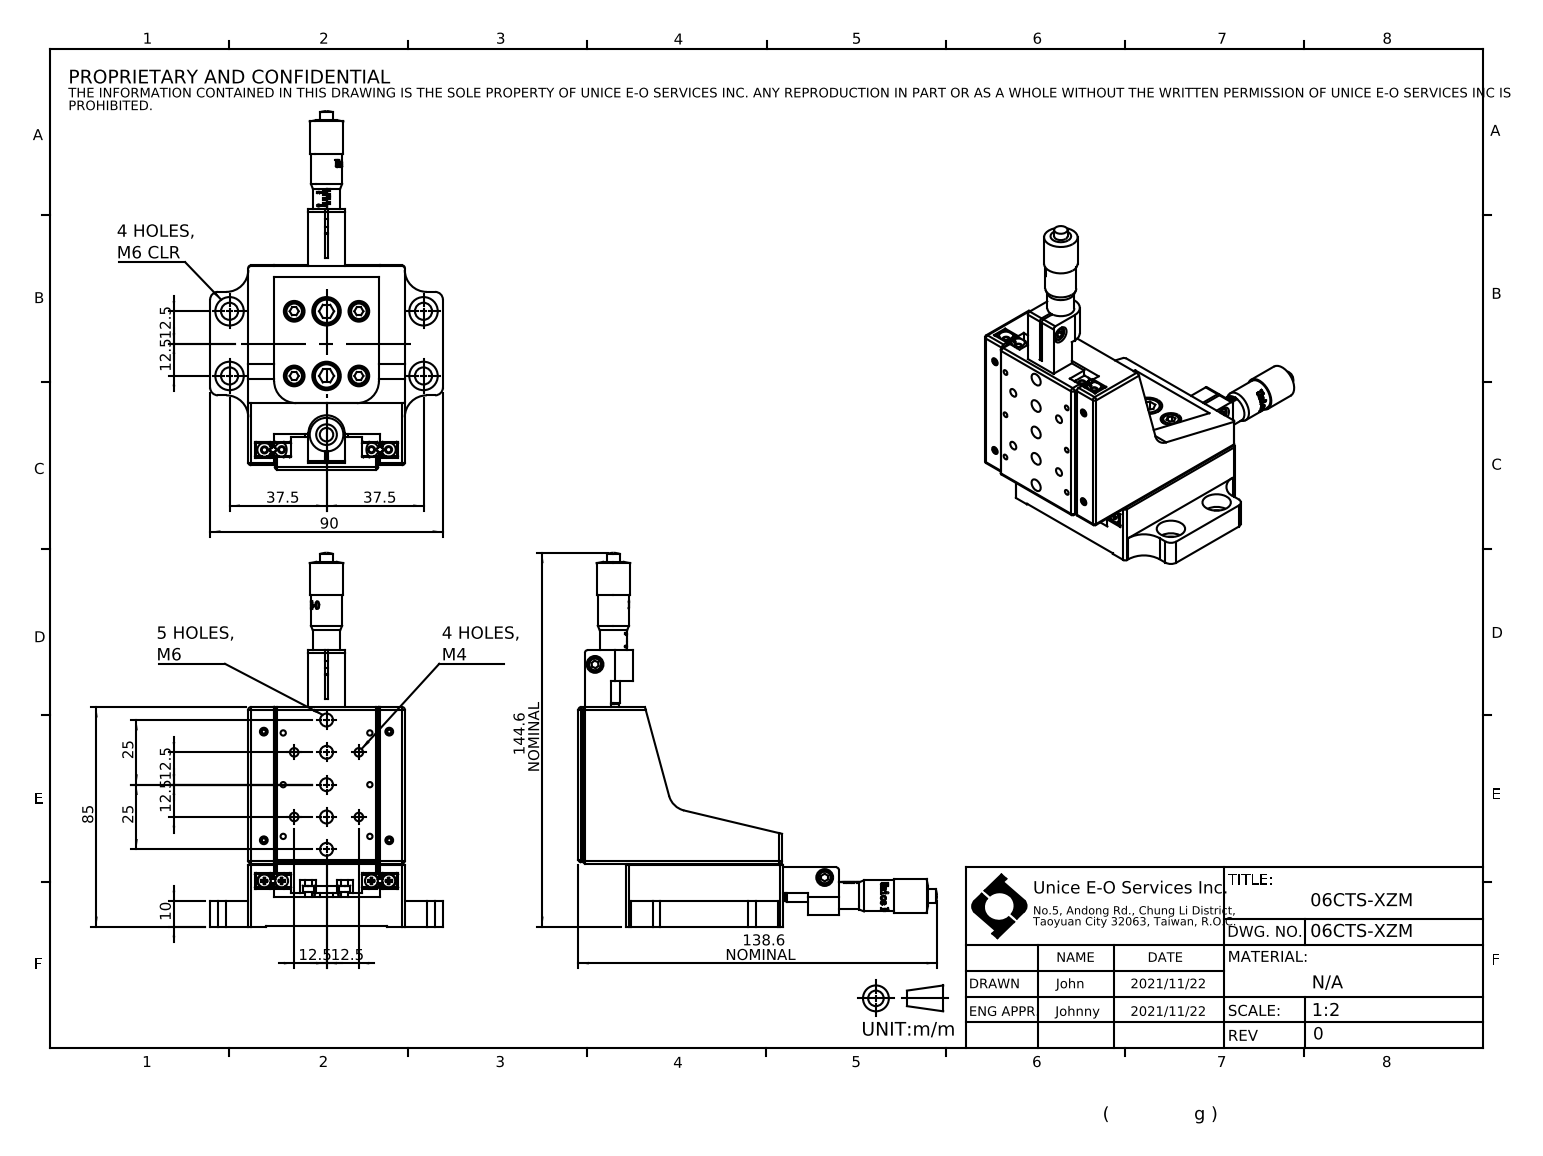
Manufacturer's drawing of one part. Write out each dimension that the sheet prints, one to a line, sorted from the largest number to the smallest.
144.6 NOMINAL
138.6 NOMINAL
90
85
37.5
37.5
25
25
12.5
12.5
12.5
12.5
12.5
12.5
10
